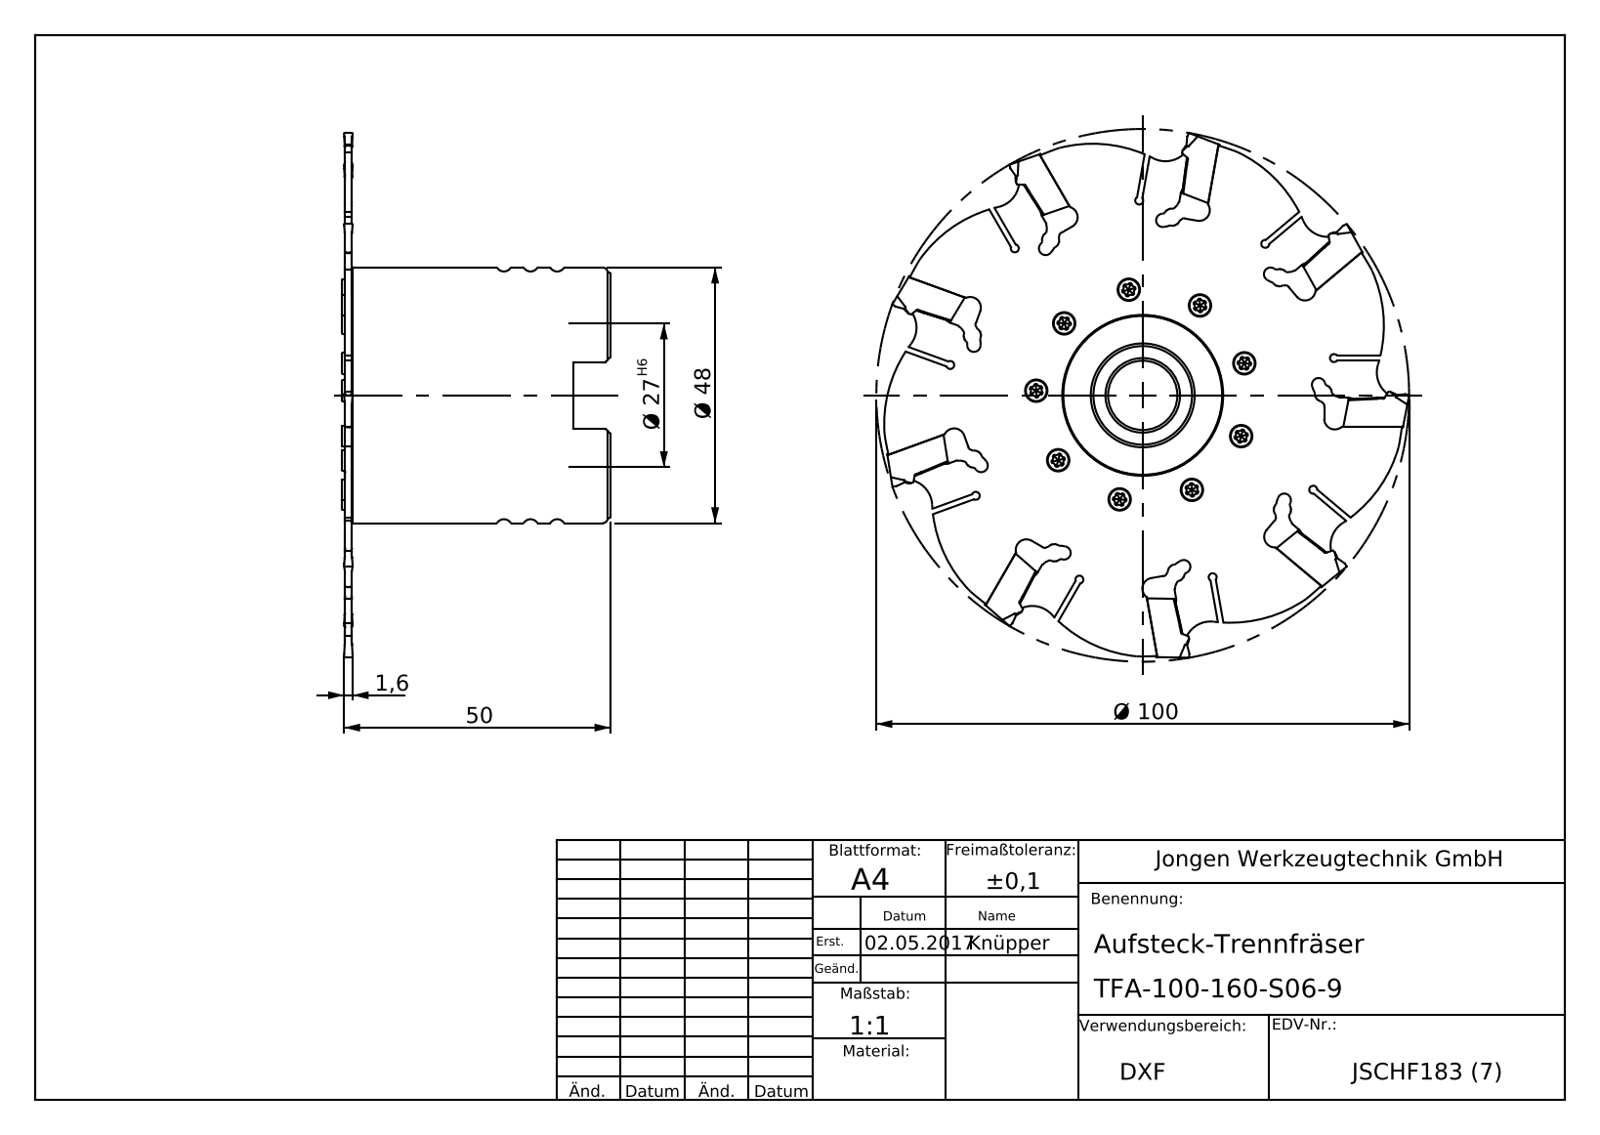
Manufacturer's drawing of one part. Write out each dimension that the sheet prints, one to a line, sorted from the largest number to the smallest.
Ø 100
50
Ø 48
Ø 27 H6
1,6
